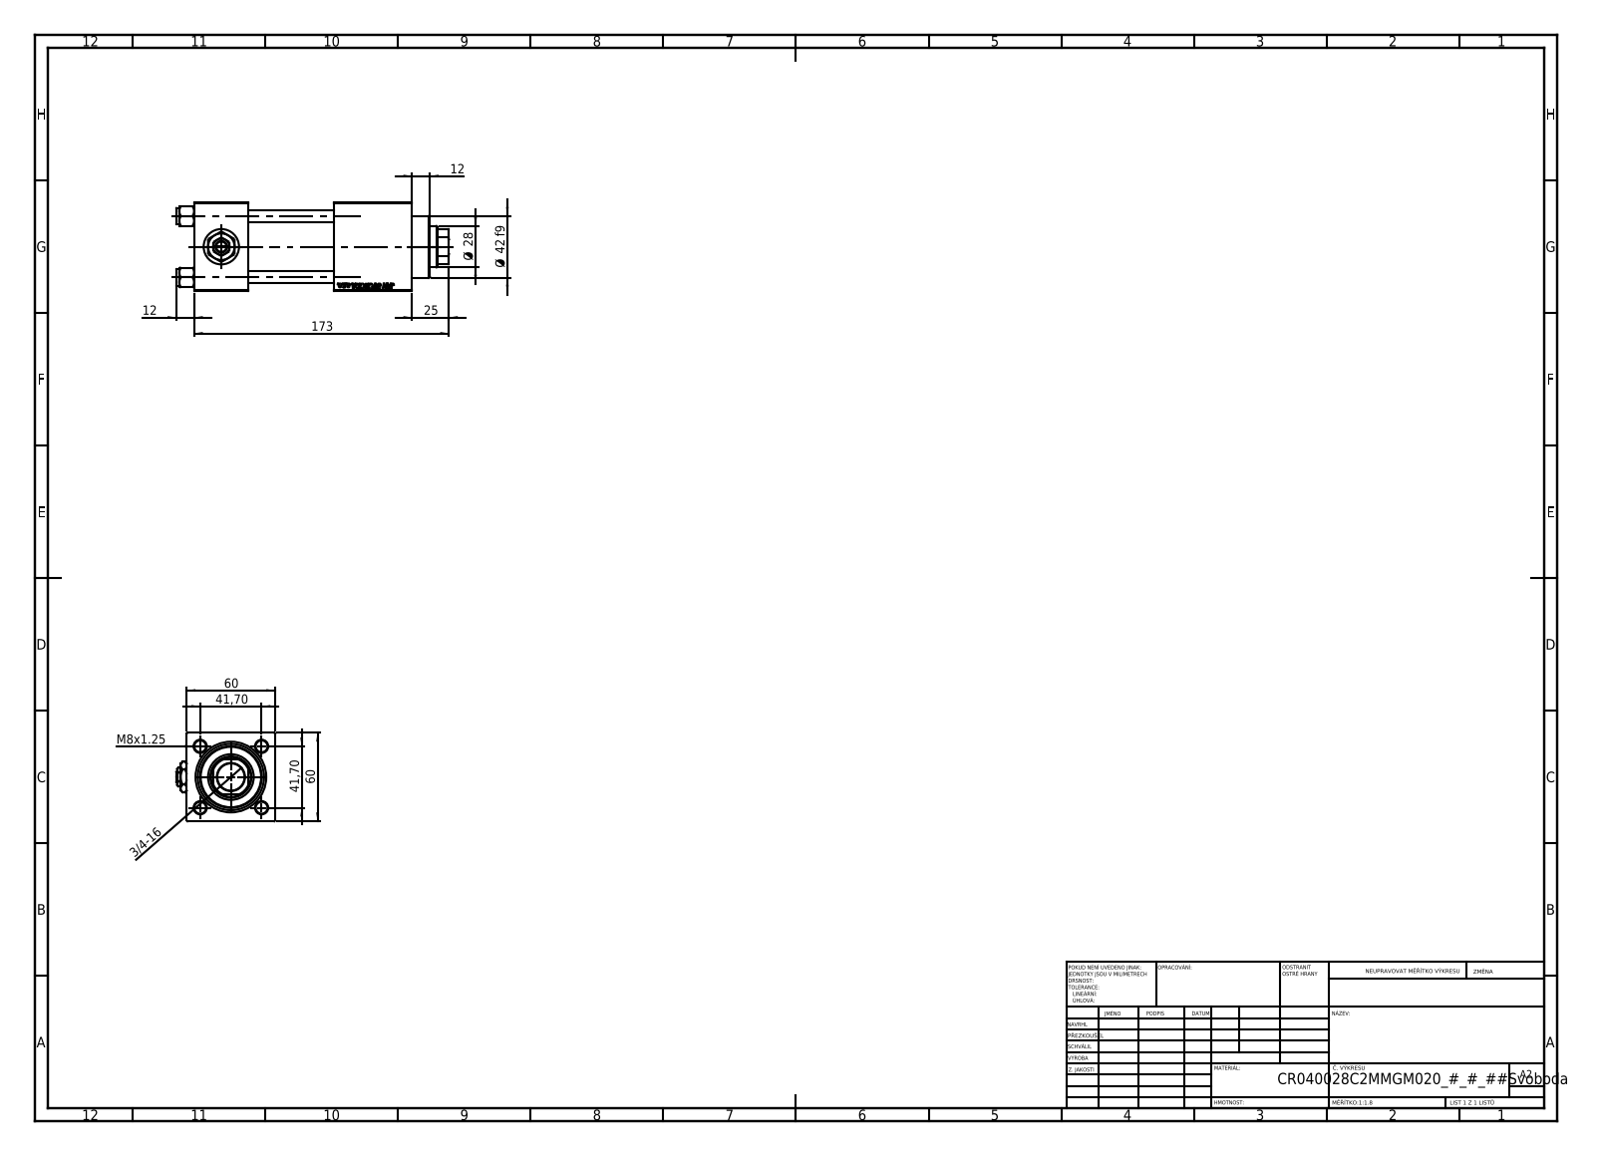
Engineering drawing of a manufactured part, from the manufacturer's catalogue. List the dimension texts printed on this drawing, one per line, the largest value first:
173
60
60
Ø 42 f9
41,70
41,70
Ø 28
25
12
12
M8x1.25
3/4-16
